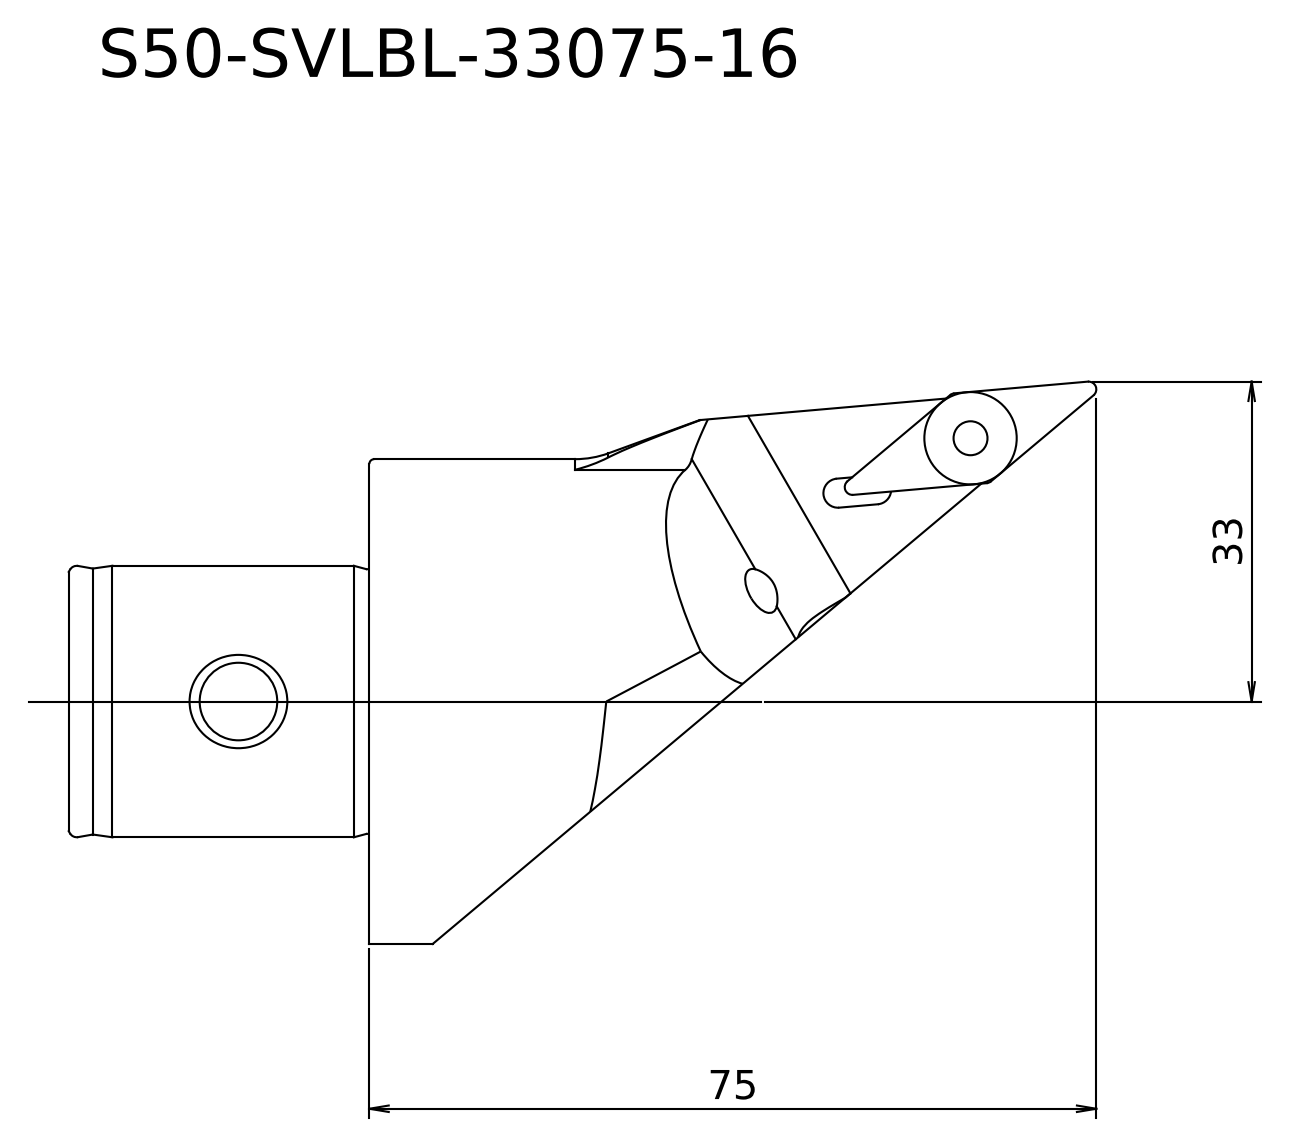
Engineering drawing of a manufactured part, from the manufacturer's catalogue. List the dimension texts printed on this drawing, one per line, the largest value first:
75
33
